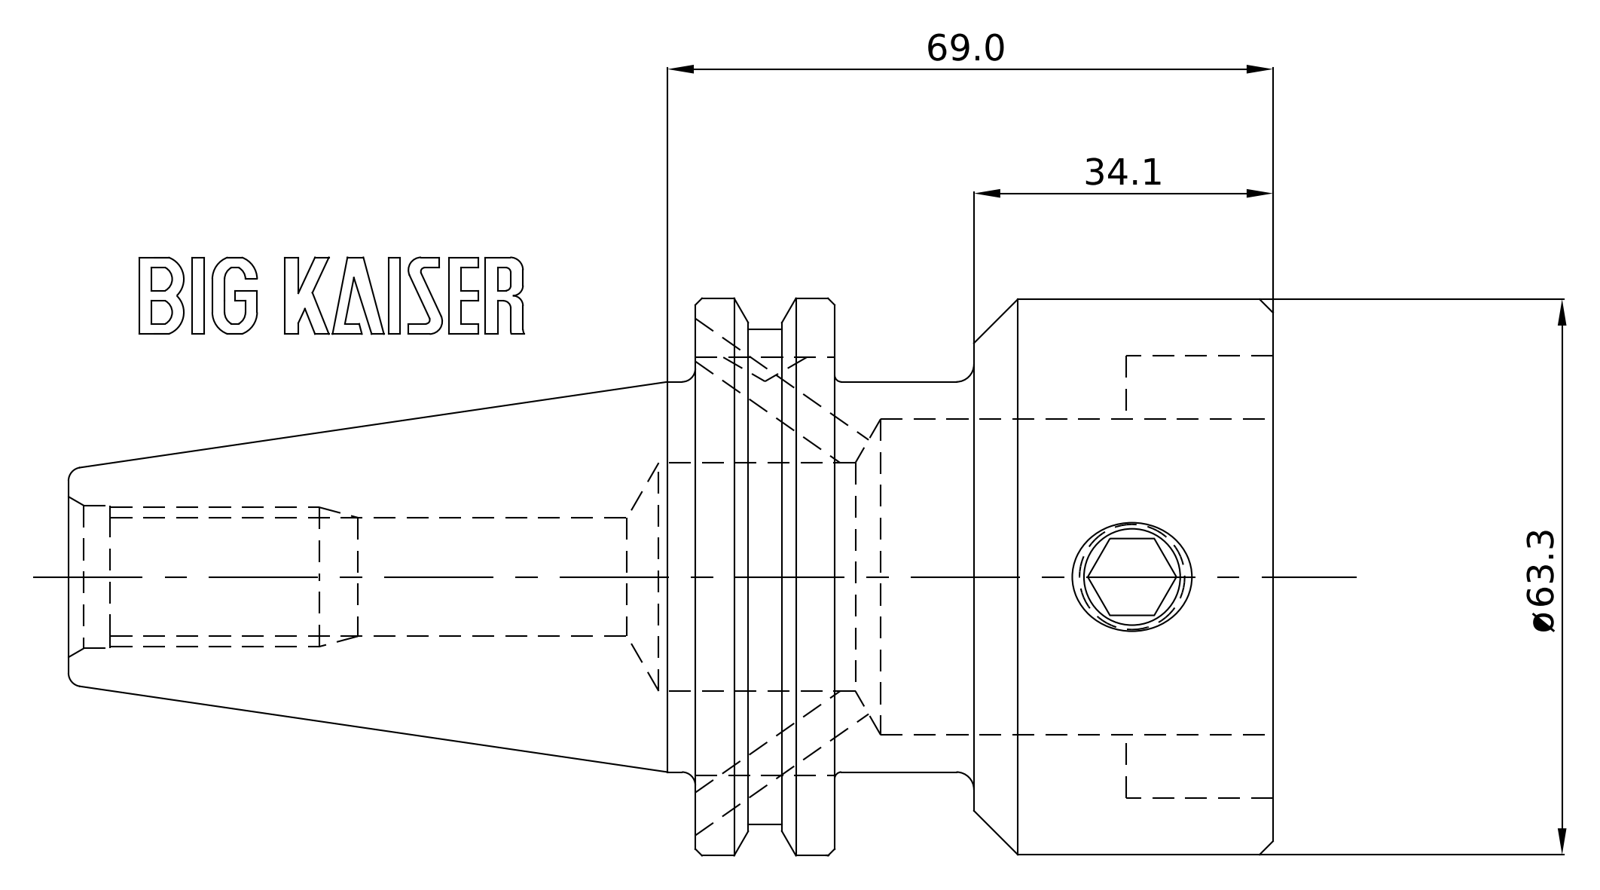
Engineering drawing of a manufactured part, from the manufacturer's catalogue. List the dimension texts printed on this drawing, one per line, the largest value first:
69.0
Ø63.3
34.1
